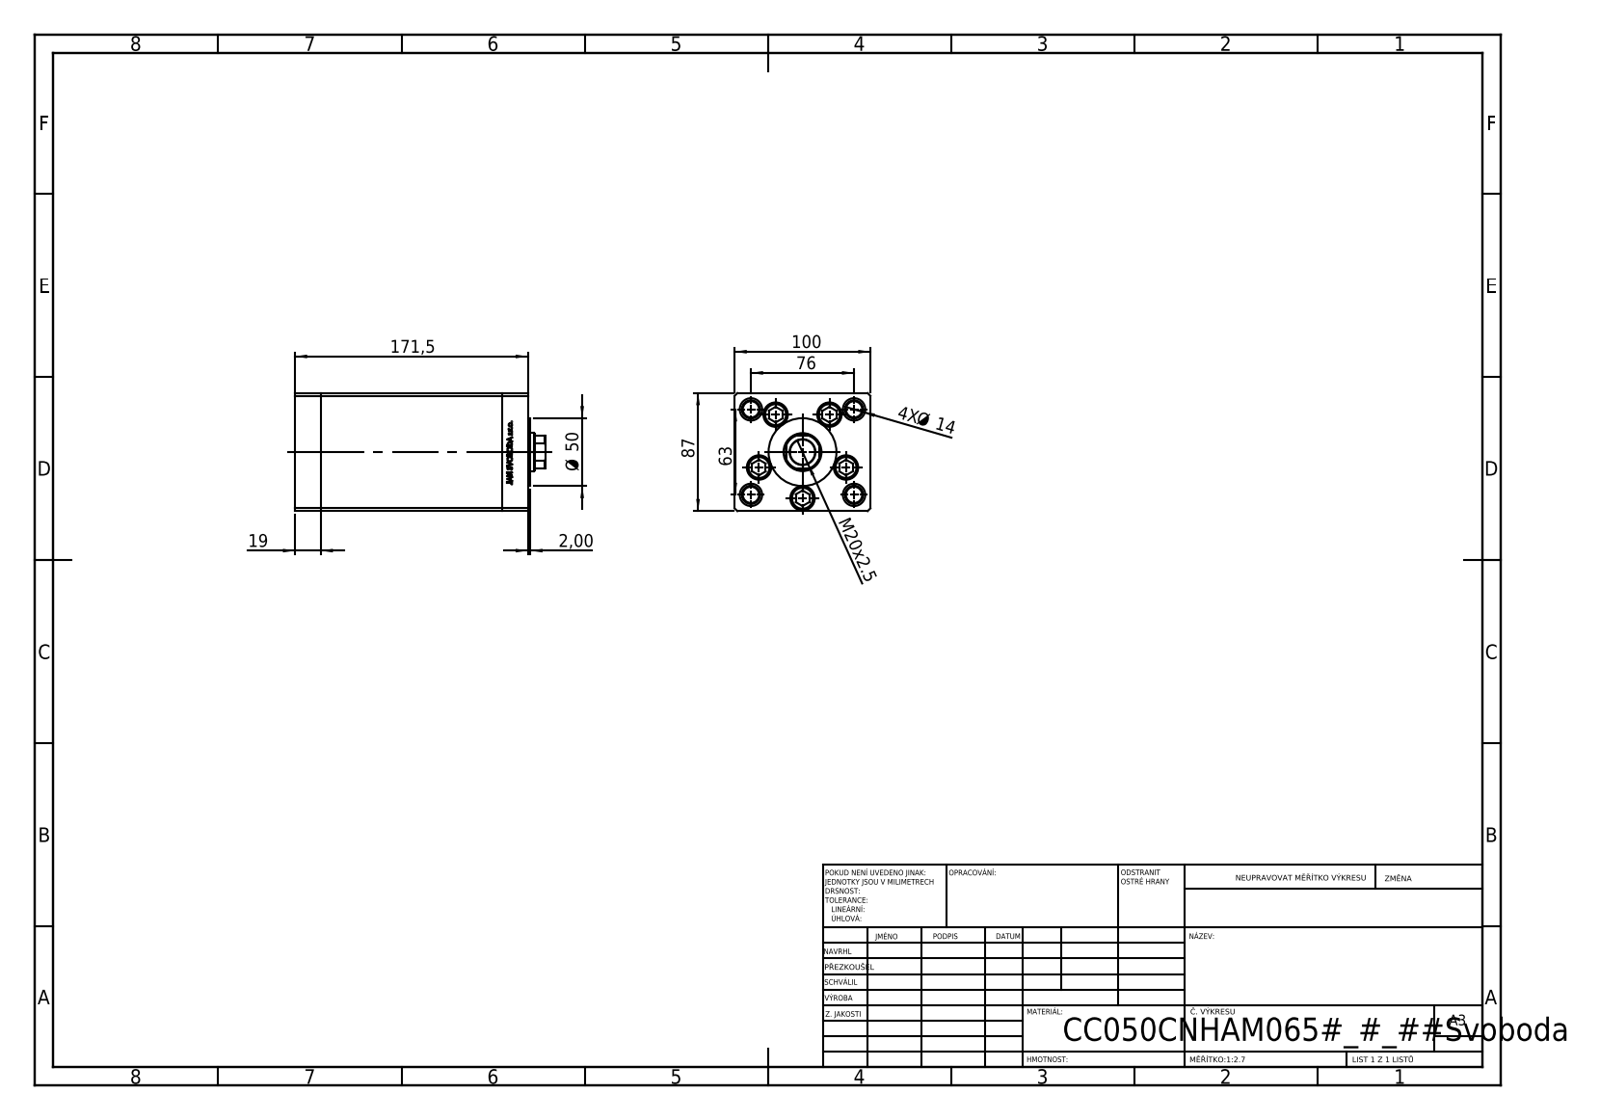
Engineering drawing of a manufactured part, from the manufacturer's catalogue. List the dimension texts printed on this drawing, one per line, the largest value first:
171,5
100
87
76
63
Ø 50
M20x2.5
19
4X Ø 14
2,00
